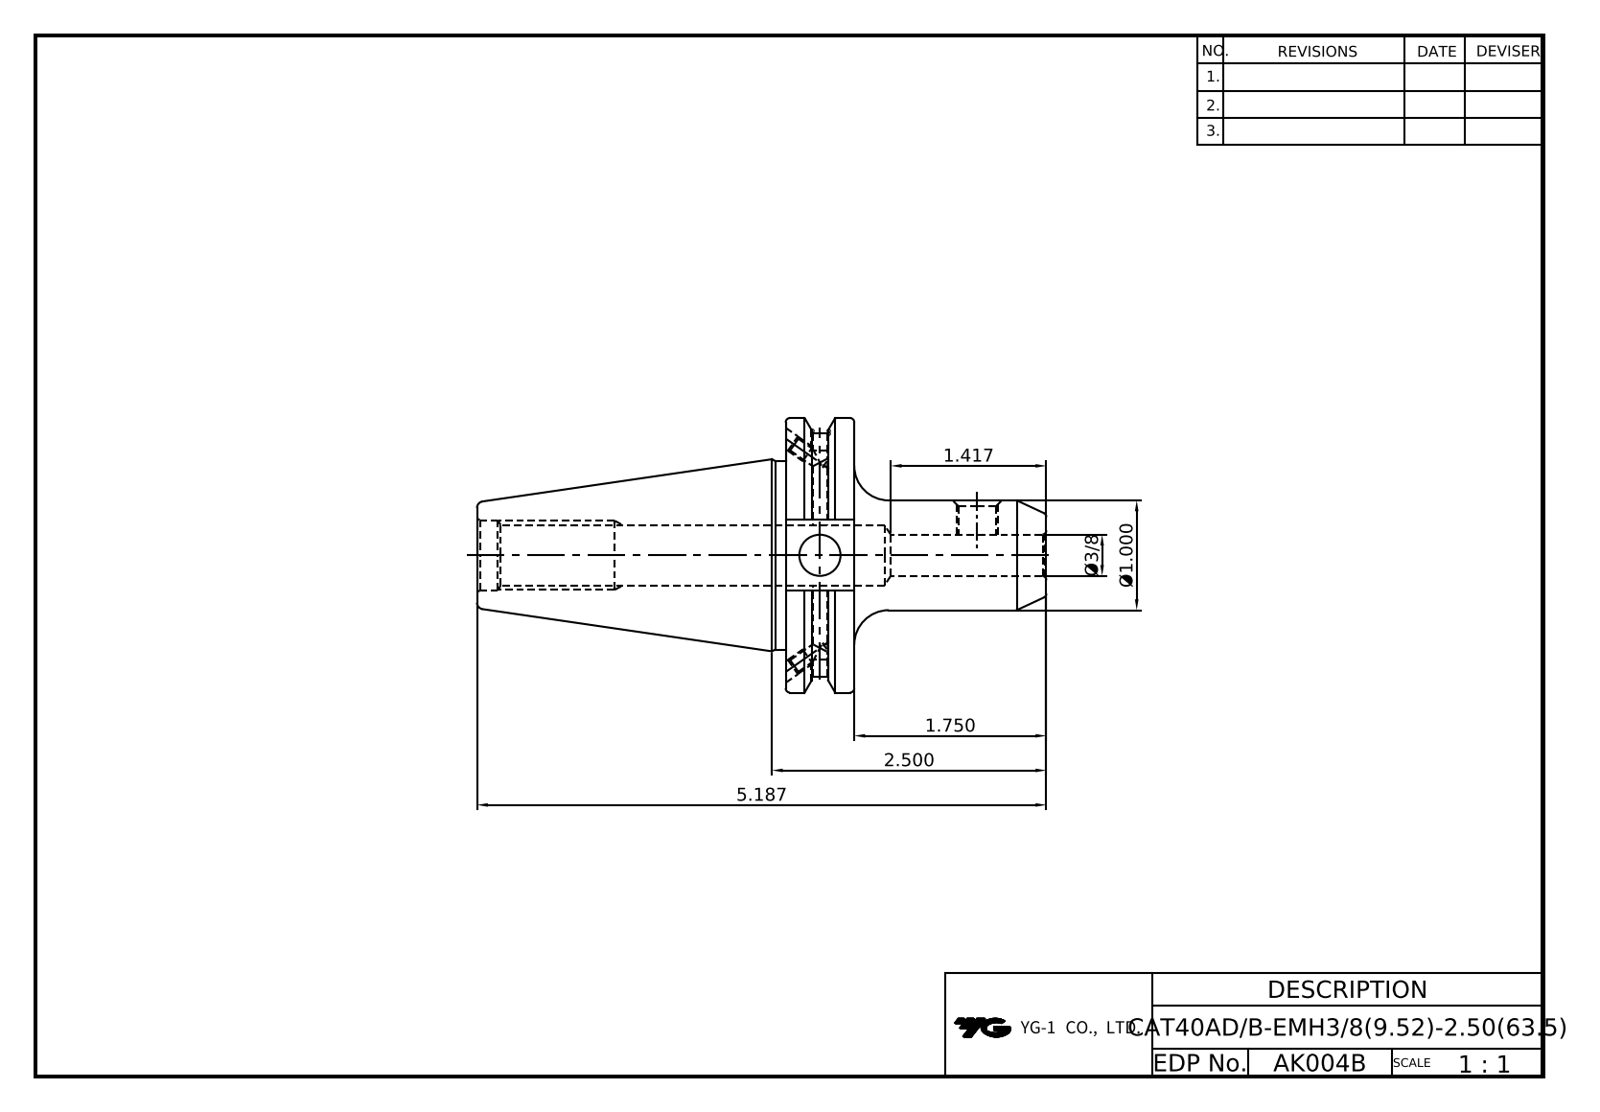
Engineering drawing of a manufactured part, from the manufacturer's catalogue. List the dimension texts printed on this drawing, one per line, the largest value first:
5.187
2.500
1.750
1.417
Ø1.000
Ø3/8
